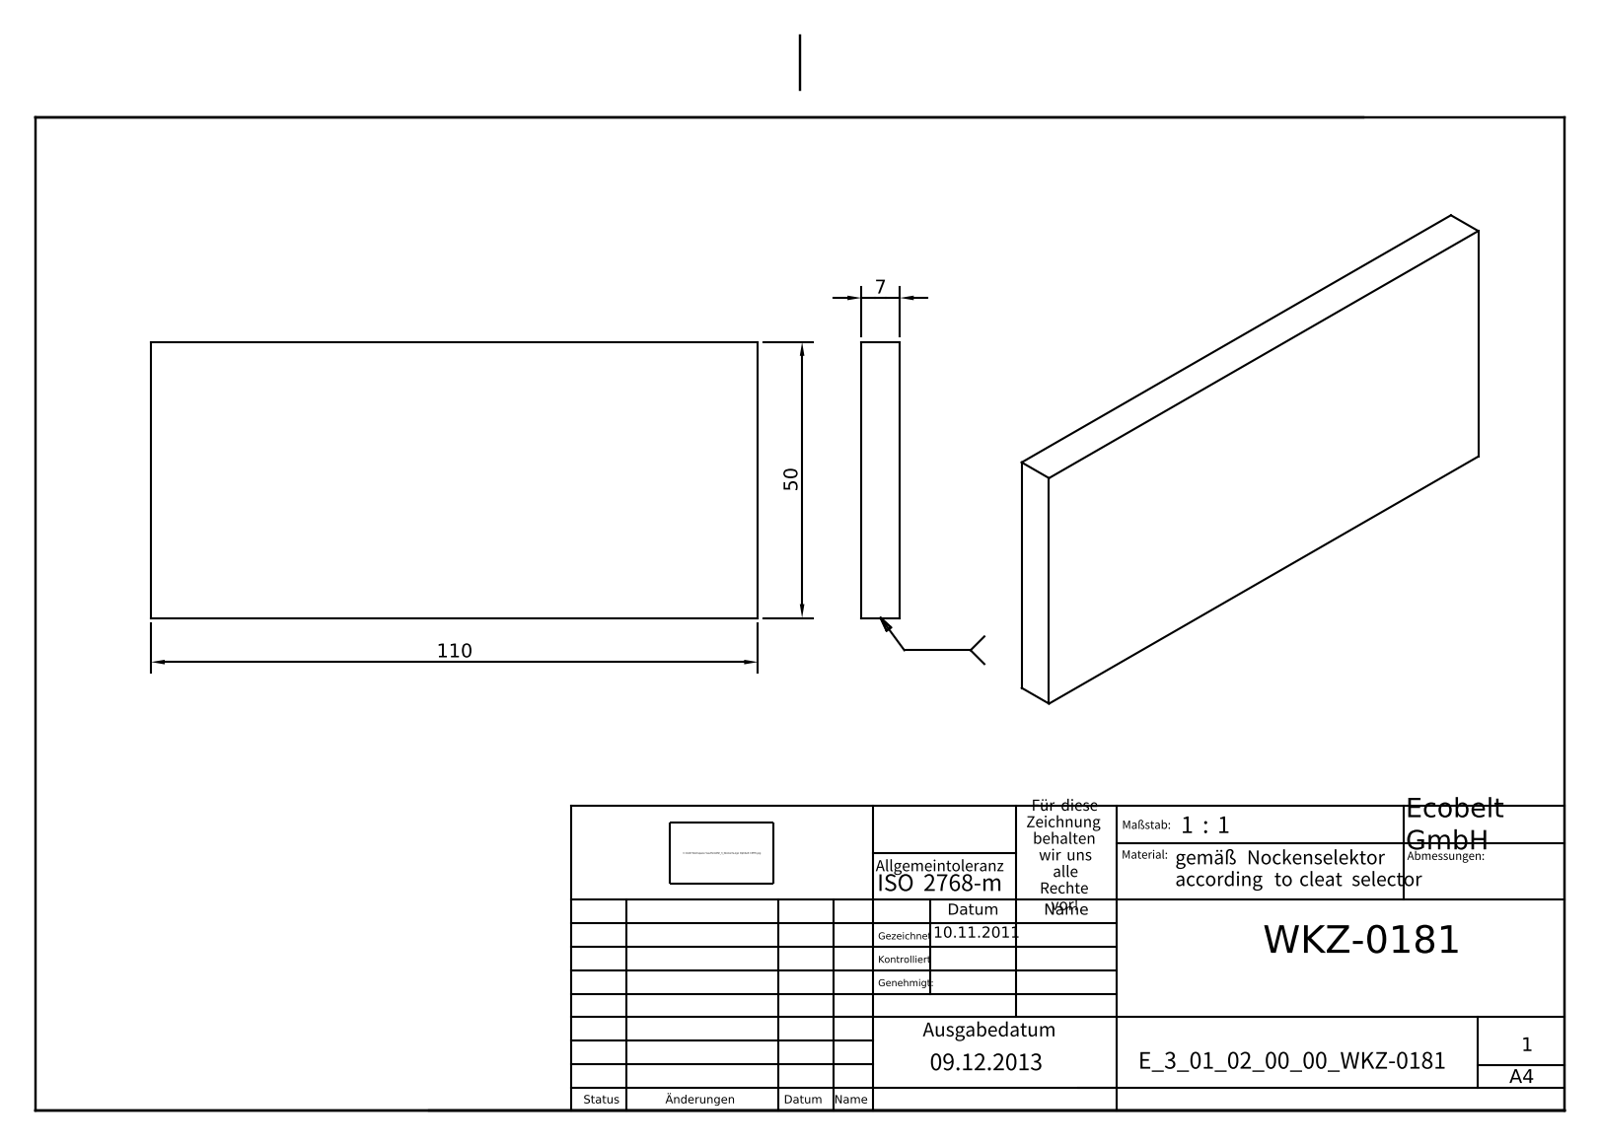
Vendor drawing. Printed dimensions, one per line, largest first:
110
50
7
